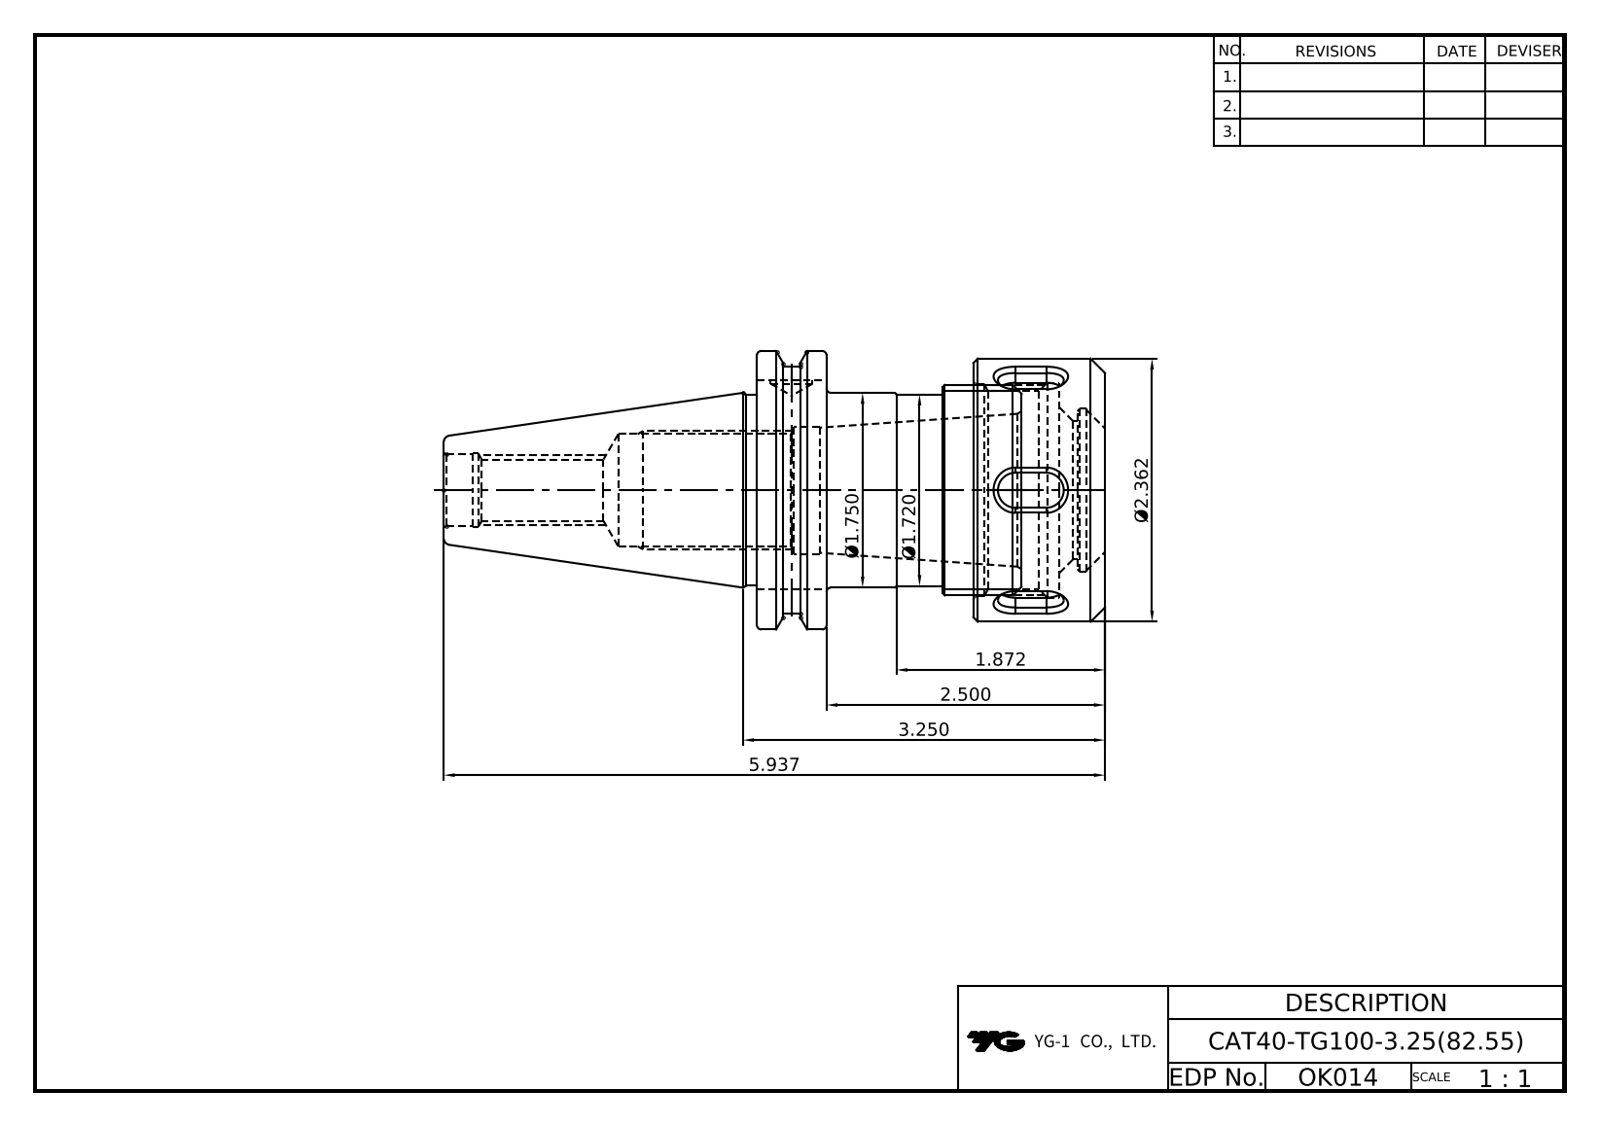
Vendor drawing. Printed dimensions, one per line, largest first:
5.937
3.250
2.500
Ø2.362
1.872
Ø1.750
Ø1.720
